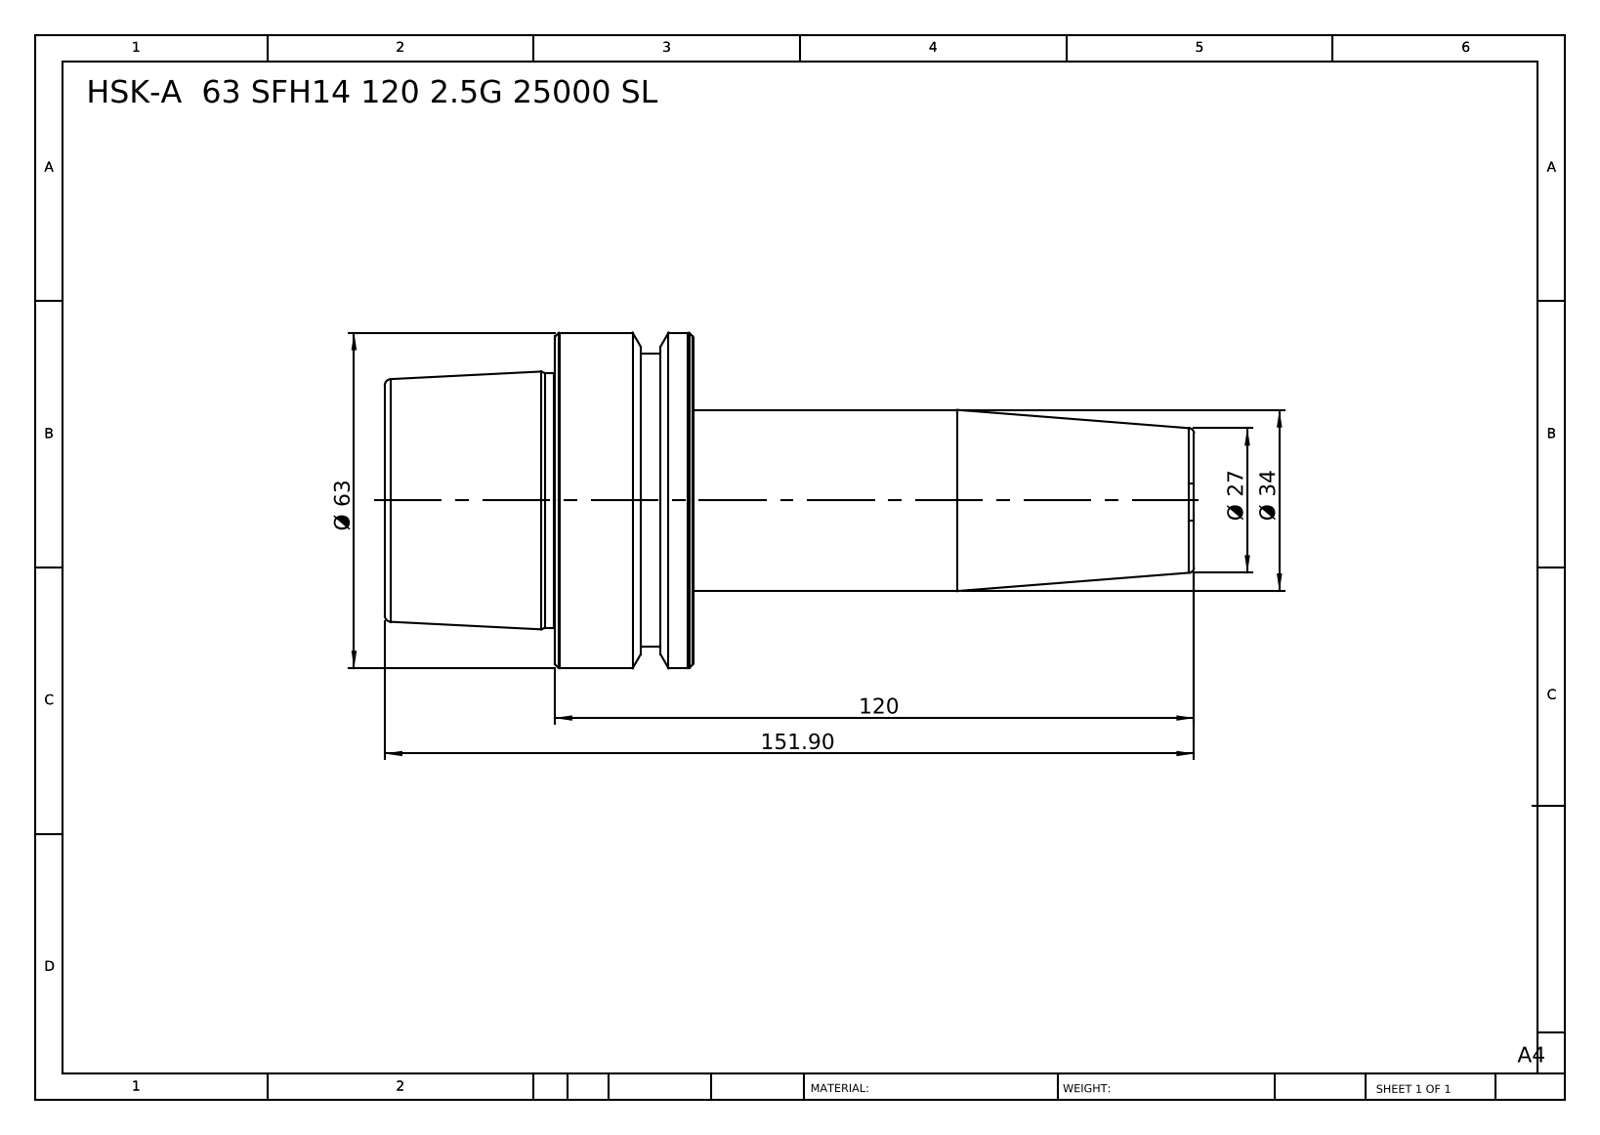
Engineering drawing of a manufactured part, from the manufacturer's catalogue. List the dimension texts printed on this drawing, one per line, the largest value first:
151.90
120
Ø 63
Ø 34
Ø 27
